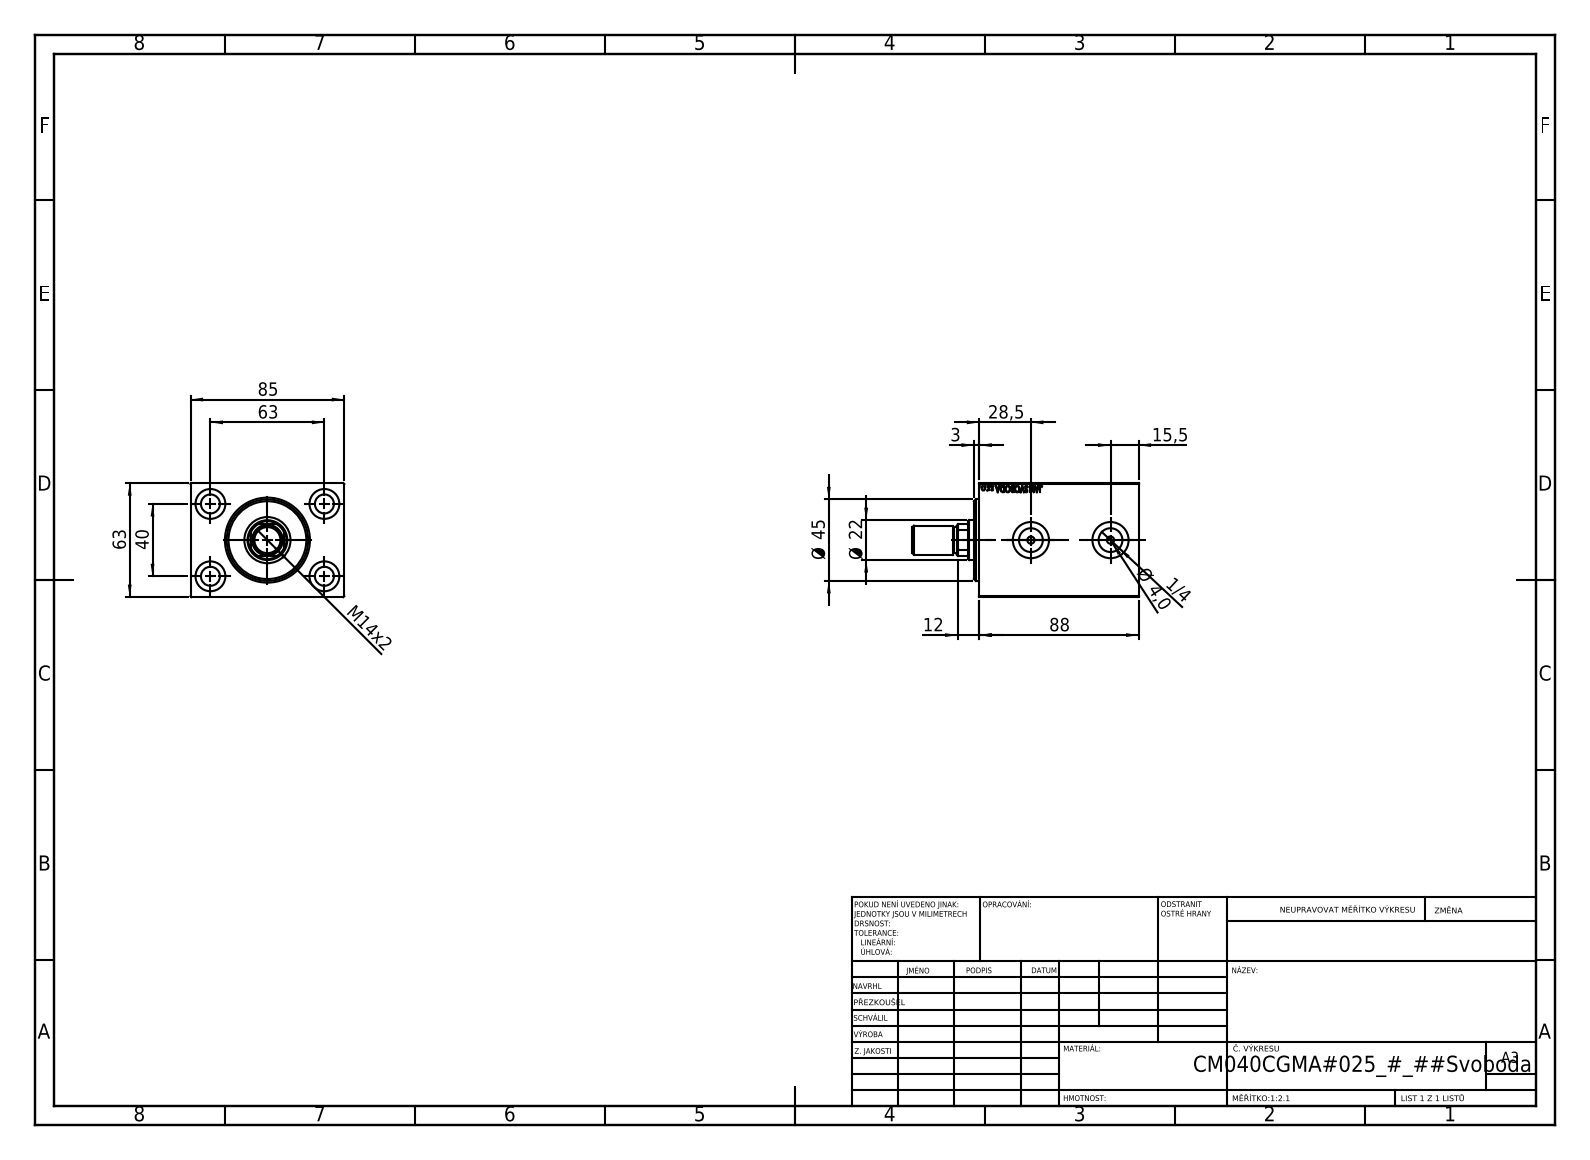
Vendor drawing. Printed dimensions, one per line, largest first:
88
85
63
63
Ø 45
40
28,5
Ø 22
15,5
M14x2
12
Ø 4,0
3
1/4
